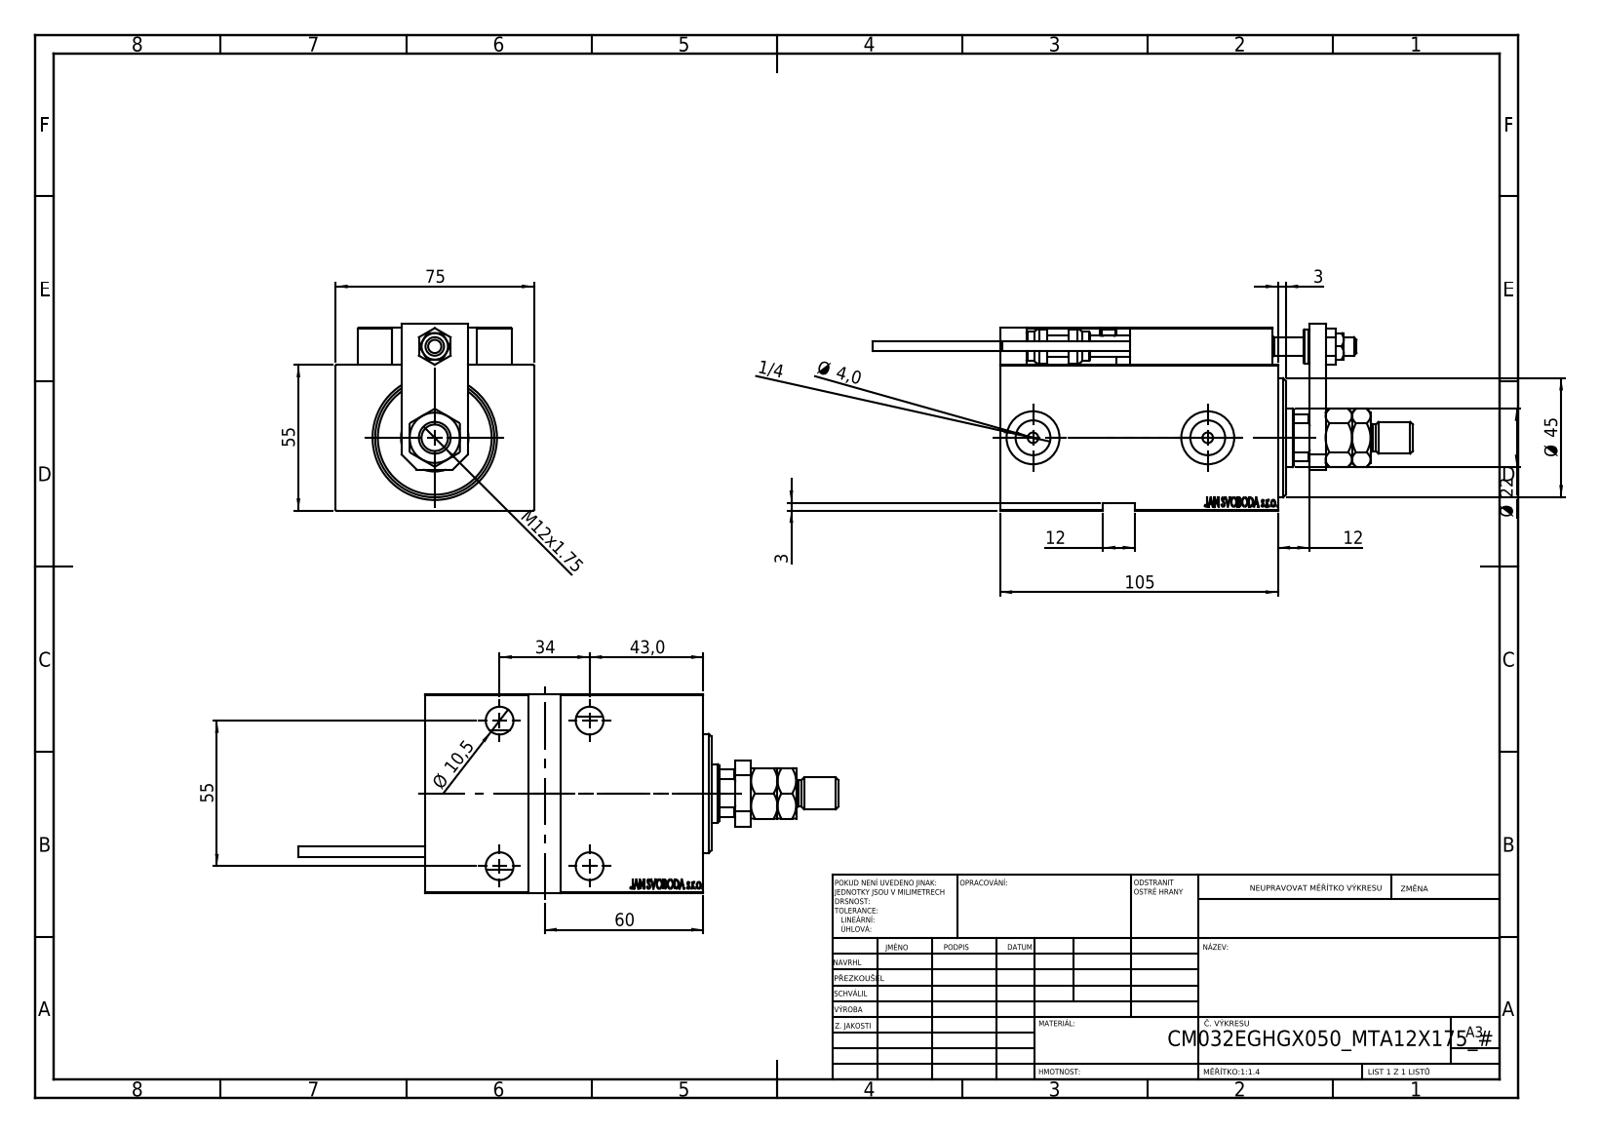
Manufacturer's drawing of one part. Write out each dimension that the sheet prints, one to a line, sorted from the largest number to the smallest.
105
75
60
55
55
Ø 45
43,0
34
Ø 22
M12x1.75
12
12
Ø 10,5
Ø 4,0
3
3
1/4
